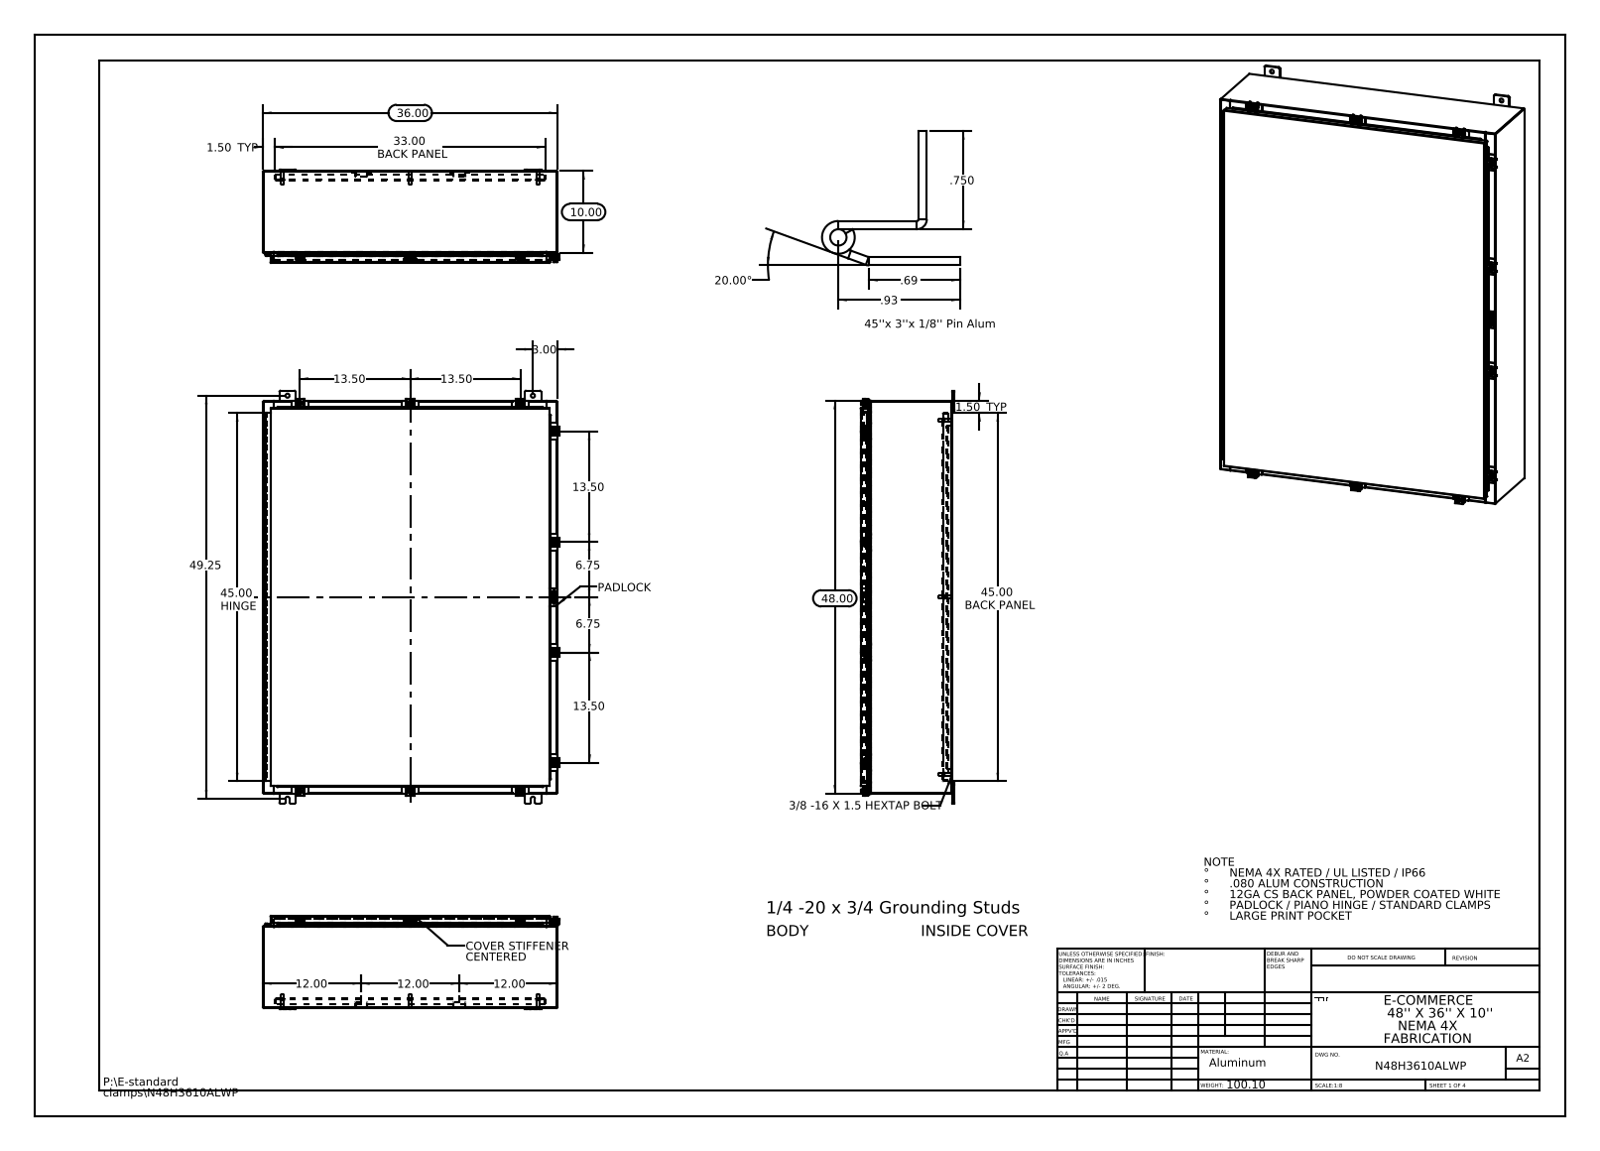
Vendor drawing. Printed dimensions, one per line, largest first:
49.25
48.00
45.00 HINGE
45.00 BACK PANEL
36.00
33.00 BACK PANEL
20.00°
13.50
13.50
13.50
13.50
12.00
12.00
12.00
10.00
6.75
6.75
3.00
1.50 TYP
1.50 TYP
.93
.750
.69
